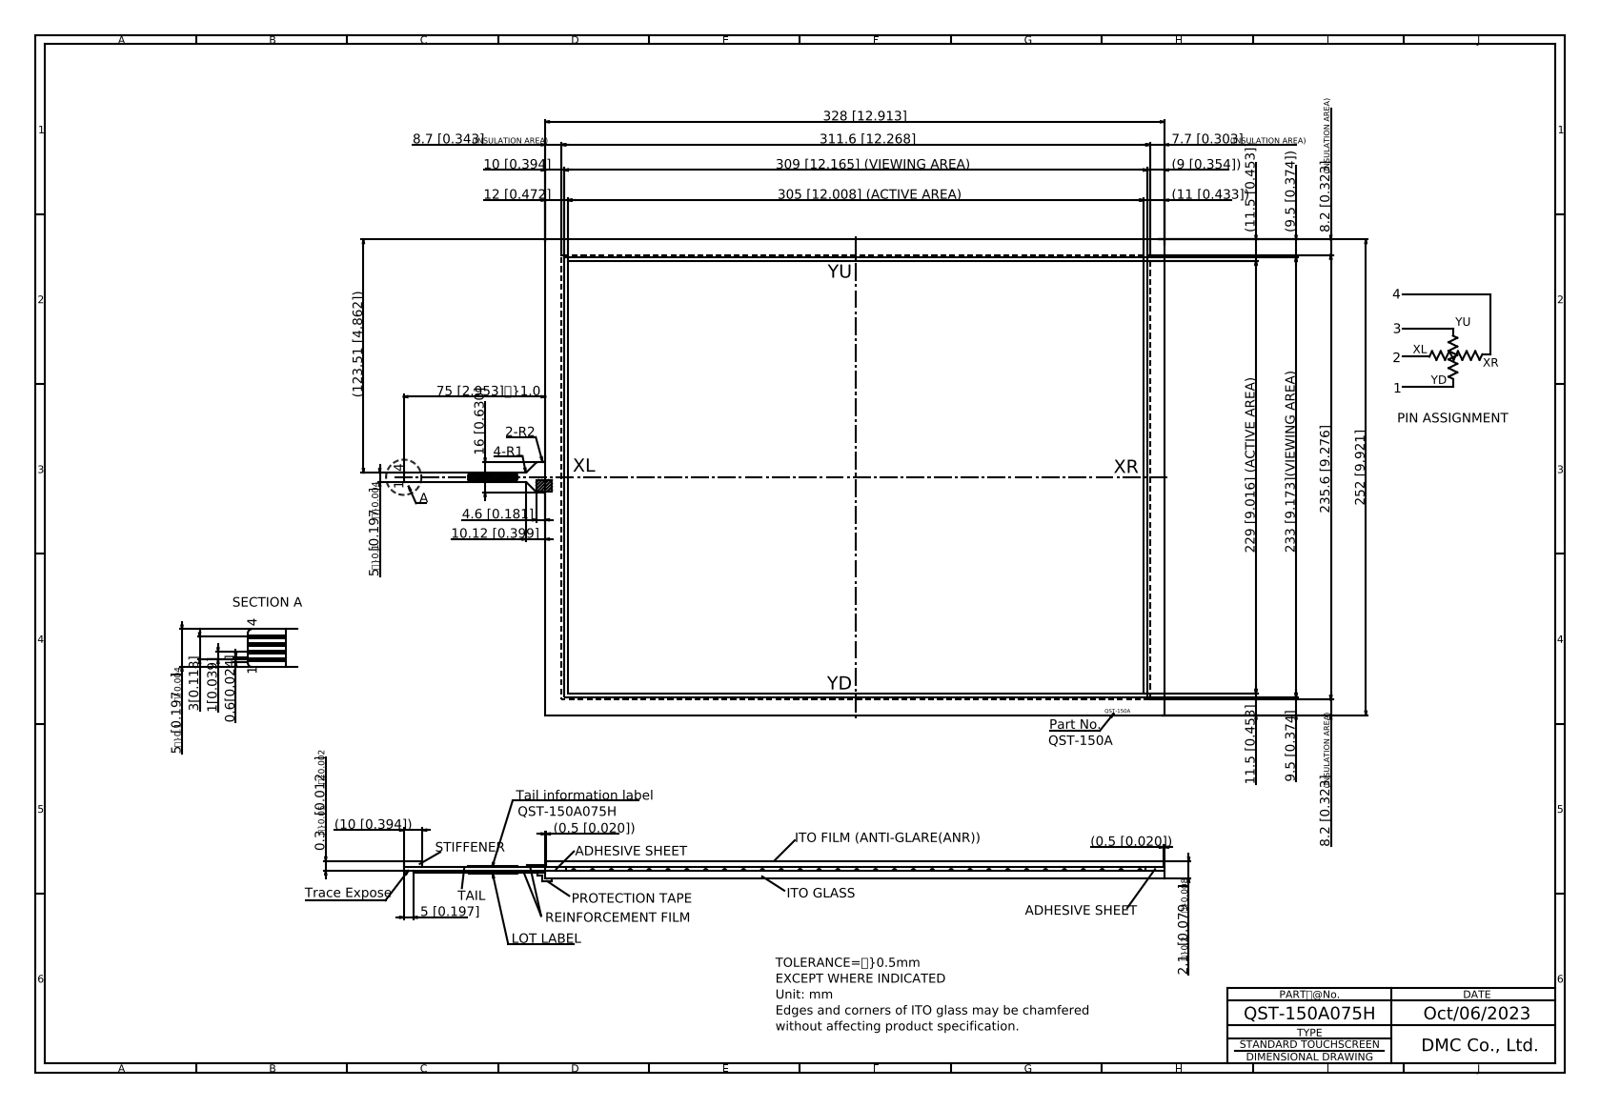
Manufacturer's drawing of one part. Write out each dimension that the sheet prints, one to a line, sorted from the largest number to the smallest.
328 [12.913]
311.6 [12.268]
309 [12.165] (VIEWING AREA)
305 [12.008] (ACTIVE AREA)
252 [9.921]
235.6 [9.276]
233 [9.173](VIEWING AREA)
229 [9.016] (ACTIVE AREA)
(123.51 [4.862])
75 [2.953]?}1.0
16 [0.630]
12 [0.472]
11.5 [0.453]
(11.5 [0.453])
(11 [0.433])
10.12 [0.399]
(10 [0.394])
10 [0.394]
9.5 [0.374]
(9.5 [0.374])
(9 [0.354])
8.70{\H0.5938x;(INSULATION AREA)}
8.20{\H0.5938x;(INSULATION AREA)}
8.20{\H0.5938x;(INSULATION AREA)}
7.70{\H0.5938x;(INSULATION AREA)}
5.00
5 [0.197]
5{\H0.6667x;?}0.1}[0.197{\H0.6667x;?}0.004}]
4.6 [0.181]
3[0.118]
2.1{\H0.6563x;?}0.2}[0.079{\H0.6563x;?}0.008}]
1[0.039]
0.6[0.024]
(0.5 [0.020])
(0.5 [0.020])
0.3{\H0.6563x;?}0.05}[0.012{\H0.6563x;?}0.002}]
